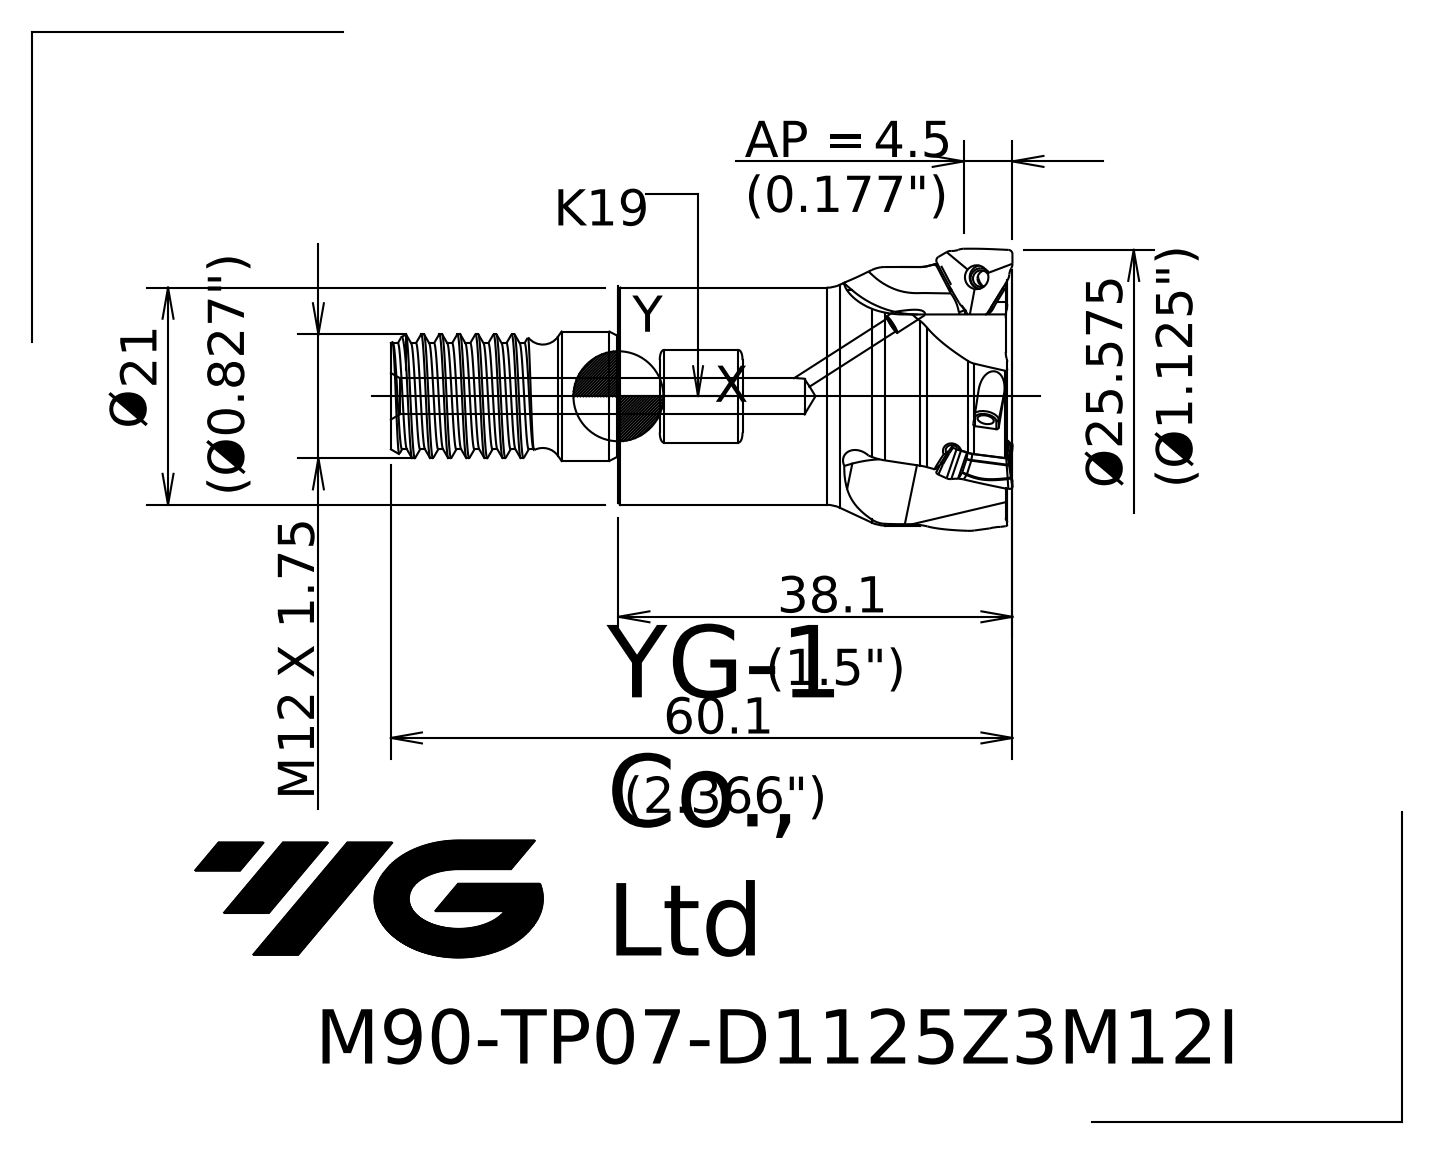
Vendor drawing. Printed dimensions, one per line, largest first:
60.1
38.1
Ø25.575
4.5 AP =
M X 1.75 12
